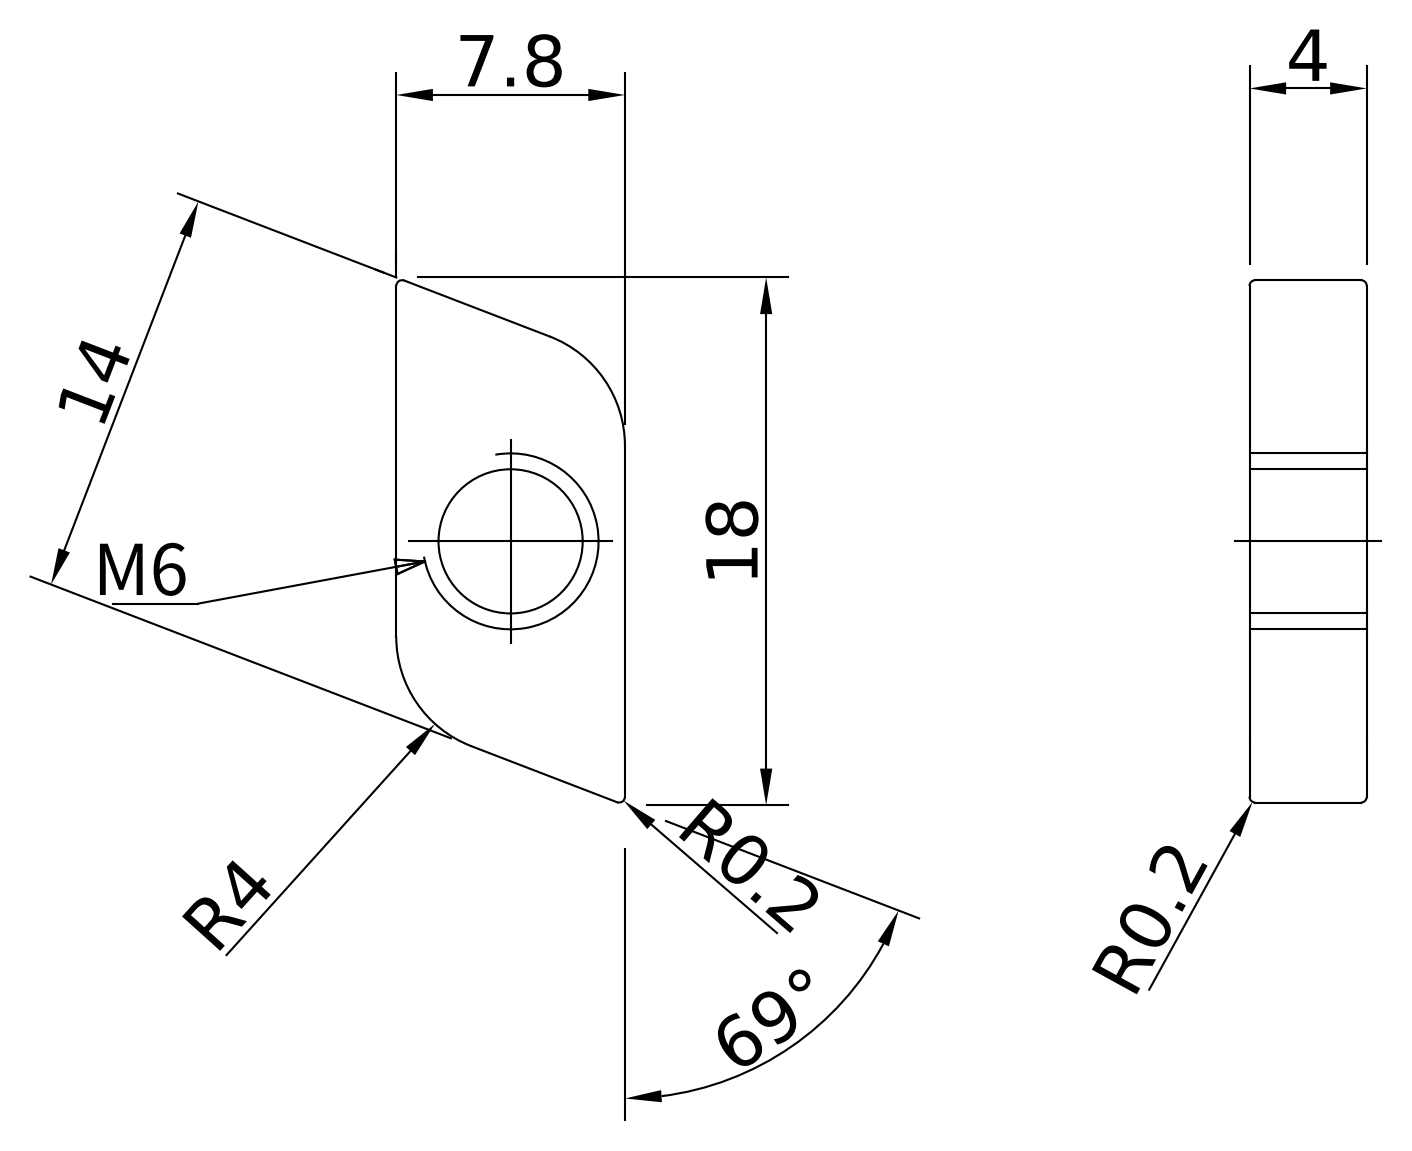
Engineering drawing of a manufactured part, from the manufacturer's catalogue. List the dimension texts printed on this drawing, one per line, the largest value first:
69°
18
14
7.8
4
R4
R0.2
R0.2
